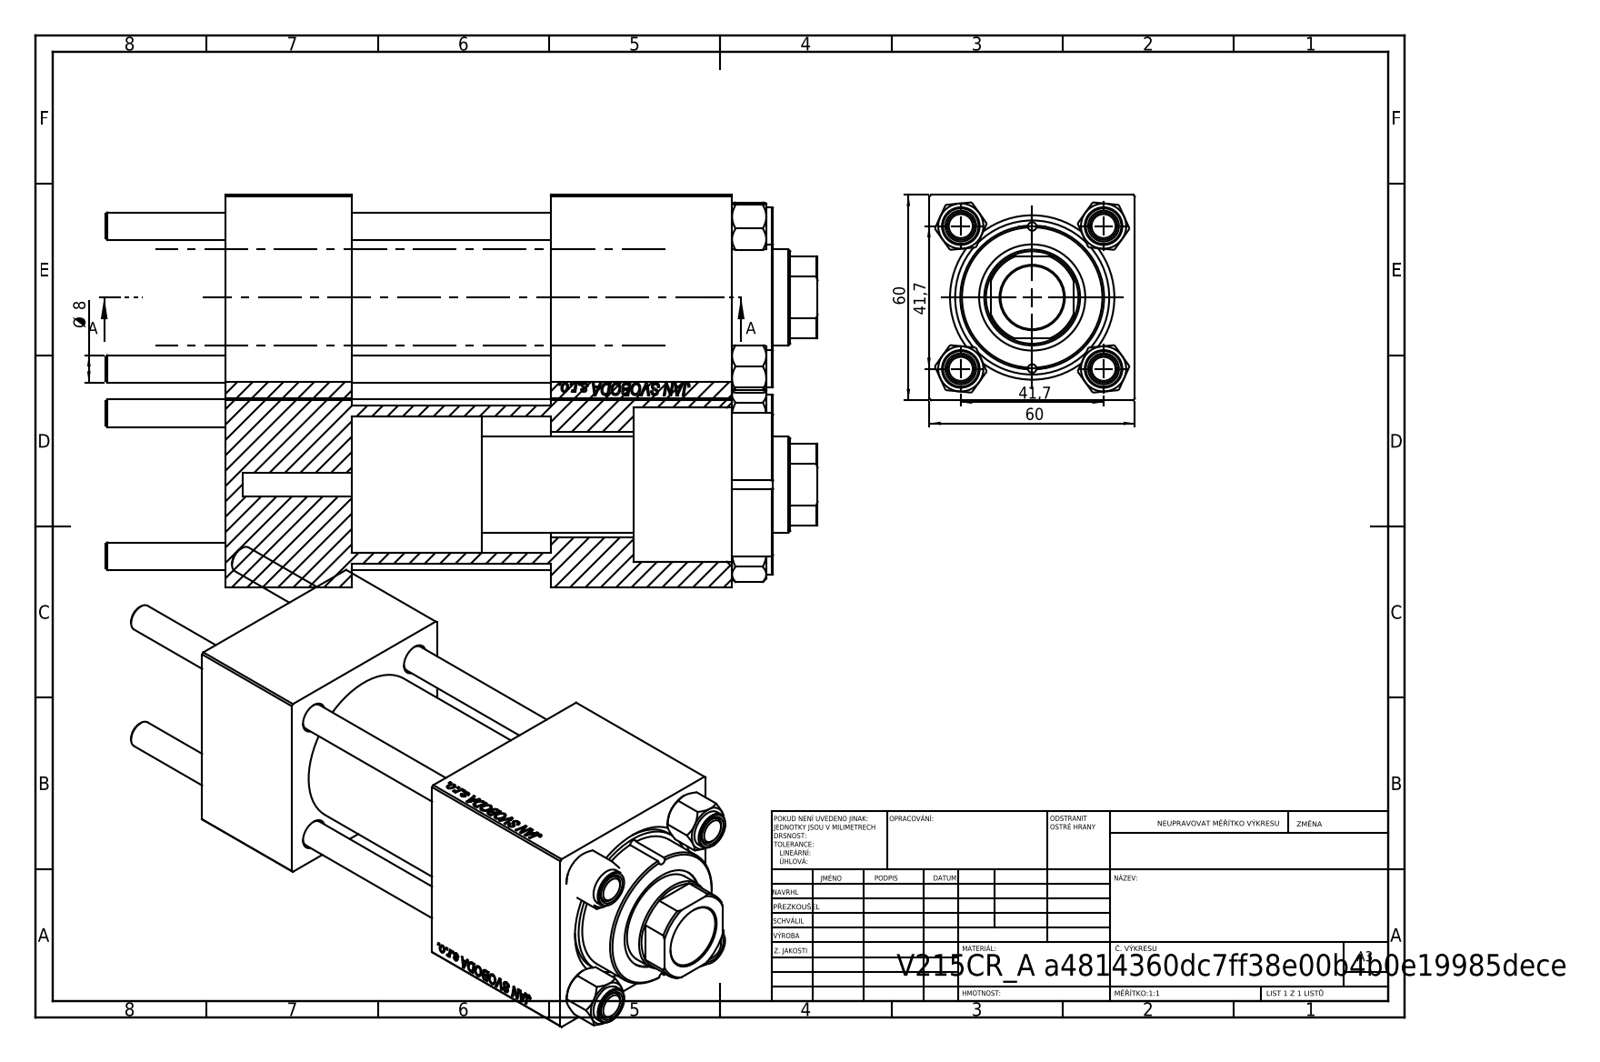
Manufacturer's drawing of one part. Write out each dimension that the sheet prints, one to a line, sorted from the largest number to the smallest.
60
60
41,7
41,7
Ø 8
